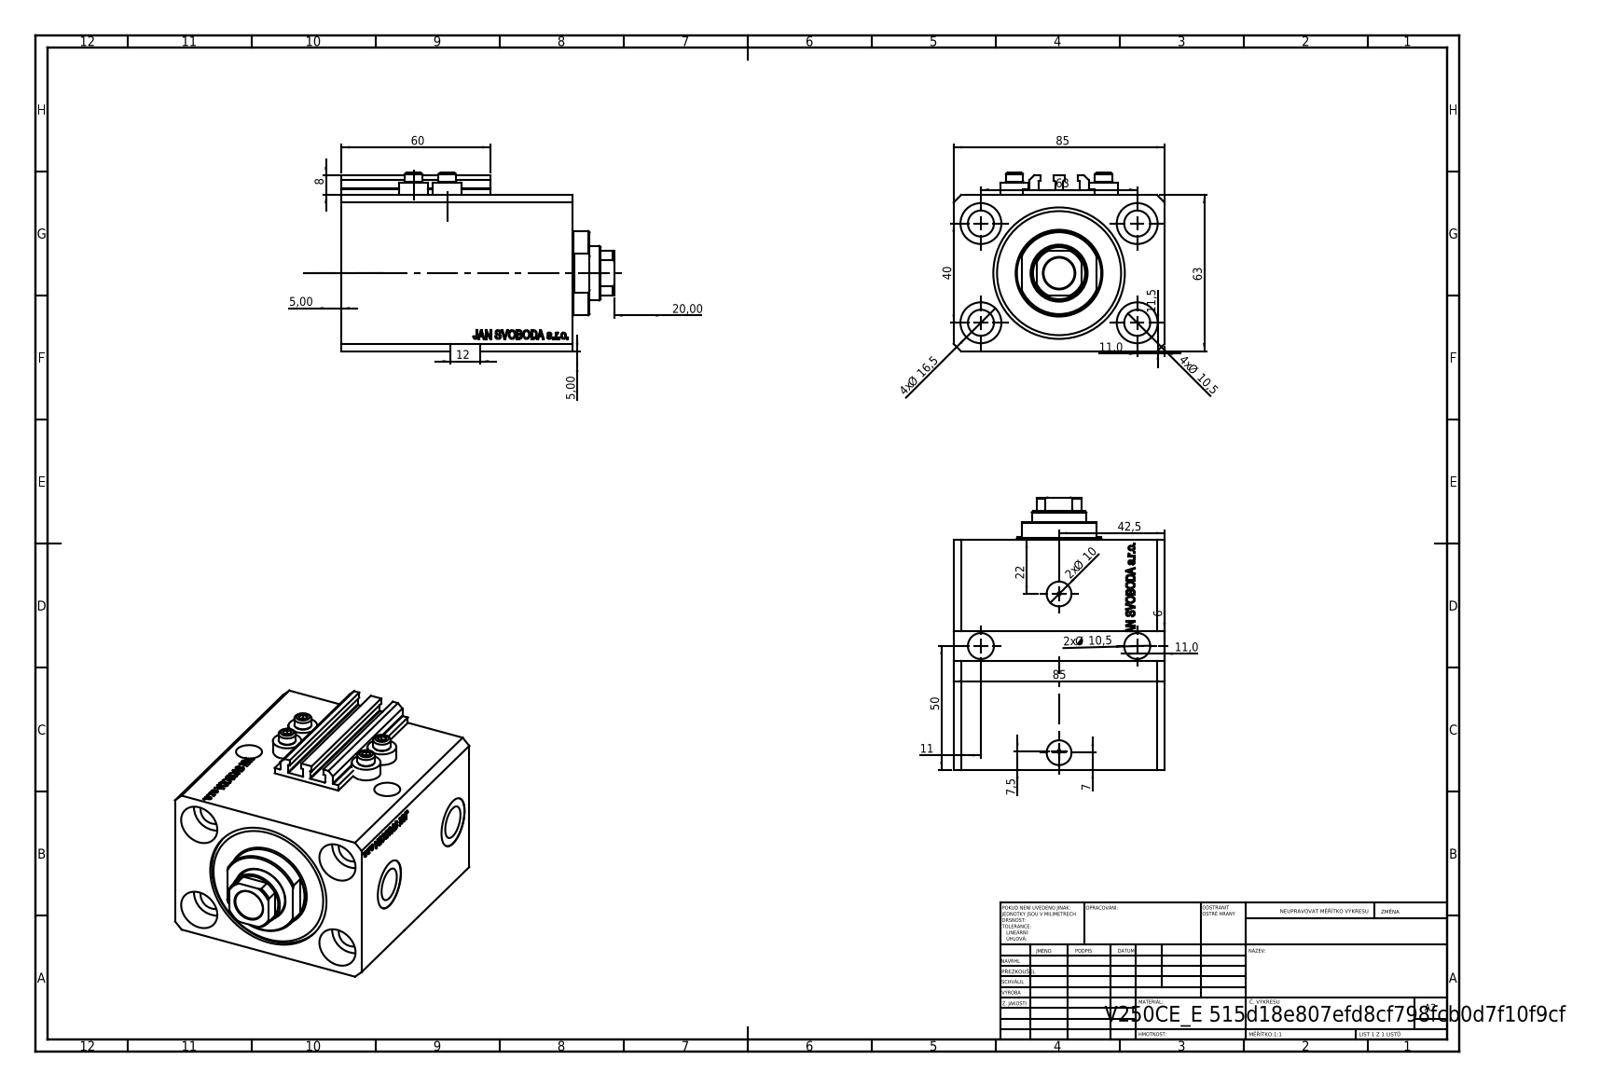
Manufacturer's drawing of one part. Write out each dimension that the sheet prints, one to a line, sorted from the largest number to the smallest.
85
85
63
63
60
50
42,5
40
22
20,00
4x Ø 16,5
12
11,5
11,0
11,0
11
4x Ø 10,5
2x Ø 10,5
2x Ø 10
8
7,5
7
6
5,00
5,00
